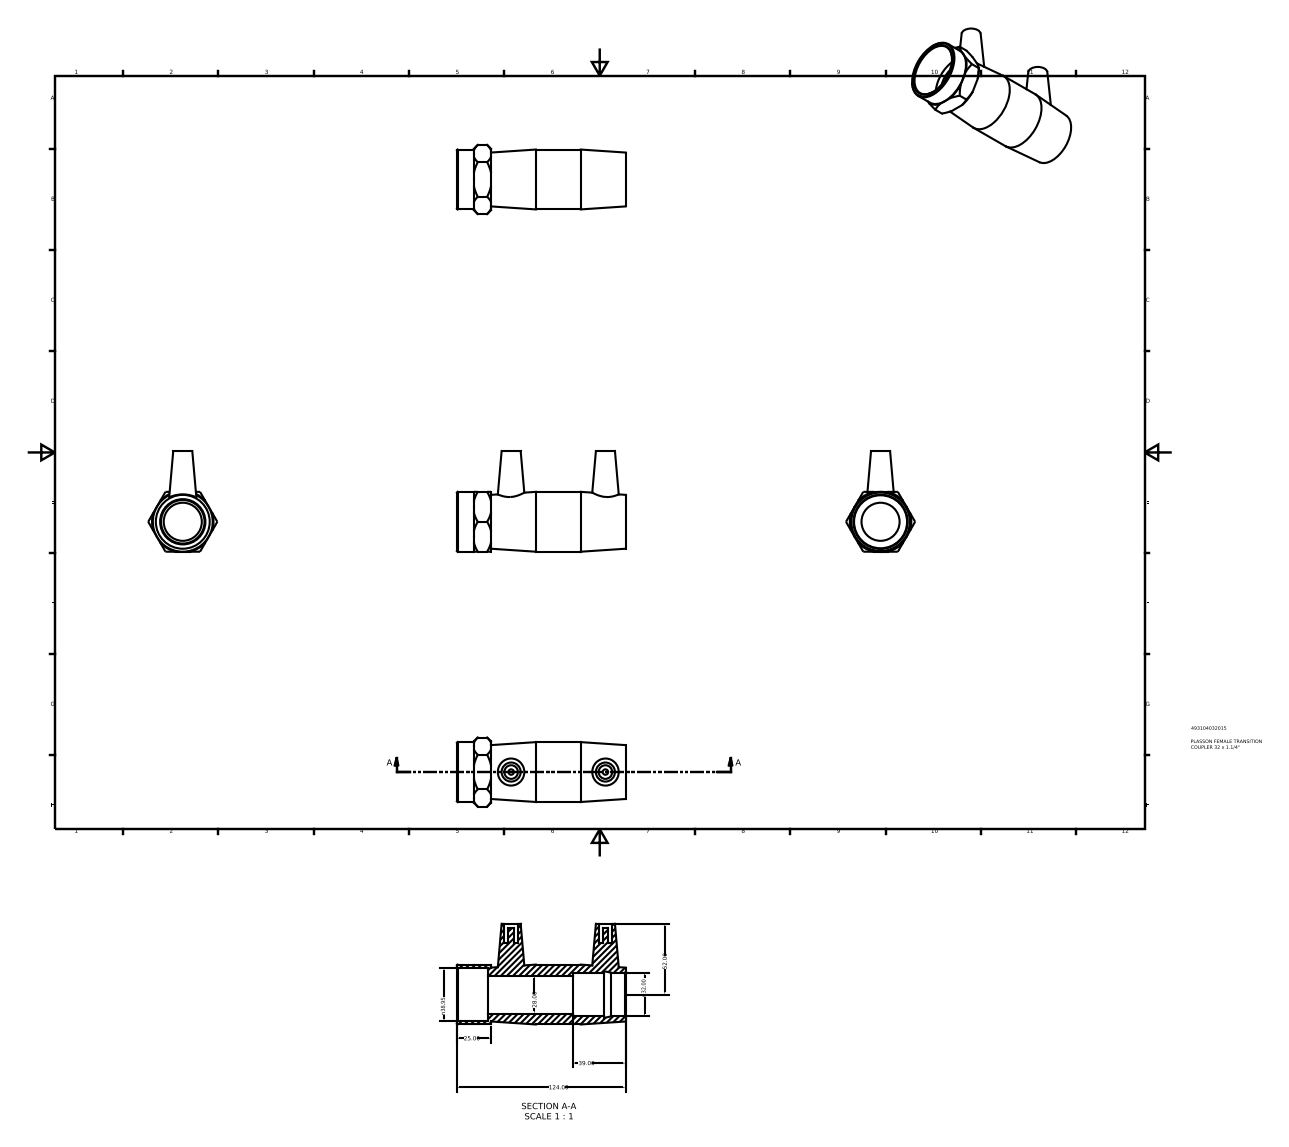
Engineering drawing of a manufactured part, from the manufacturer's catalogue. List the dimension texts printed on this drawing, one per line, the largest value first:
124.00
52.00
39.00
n38.95
n32.00
28.00
25.00
